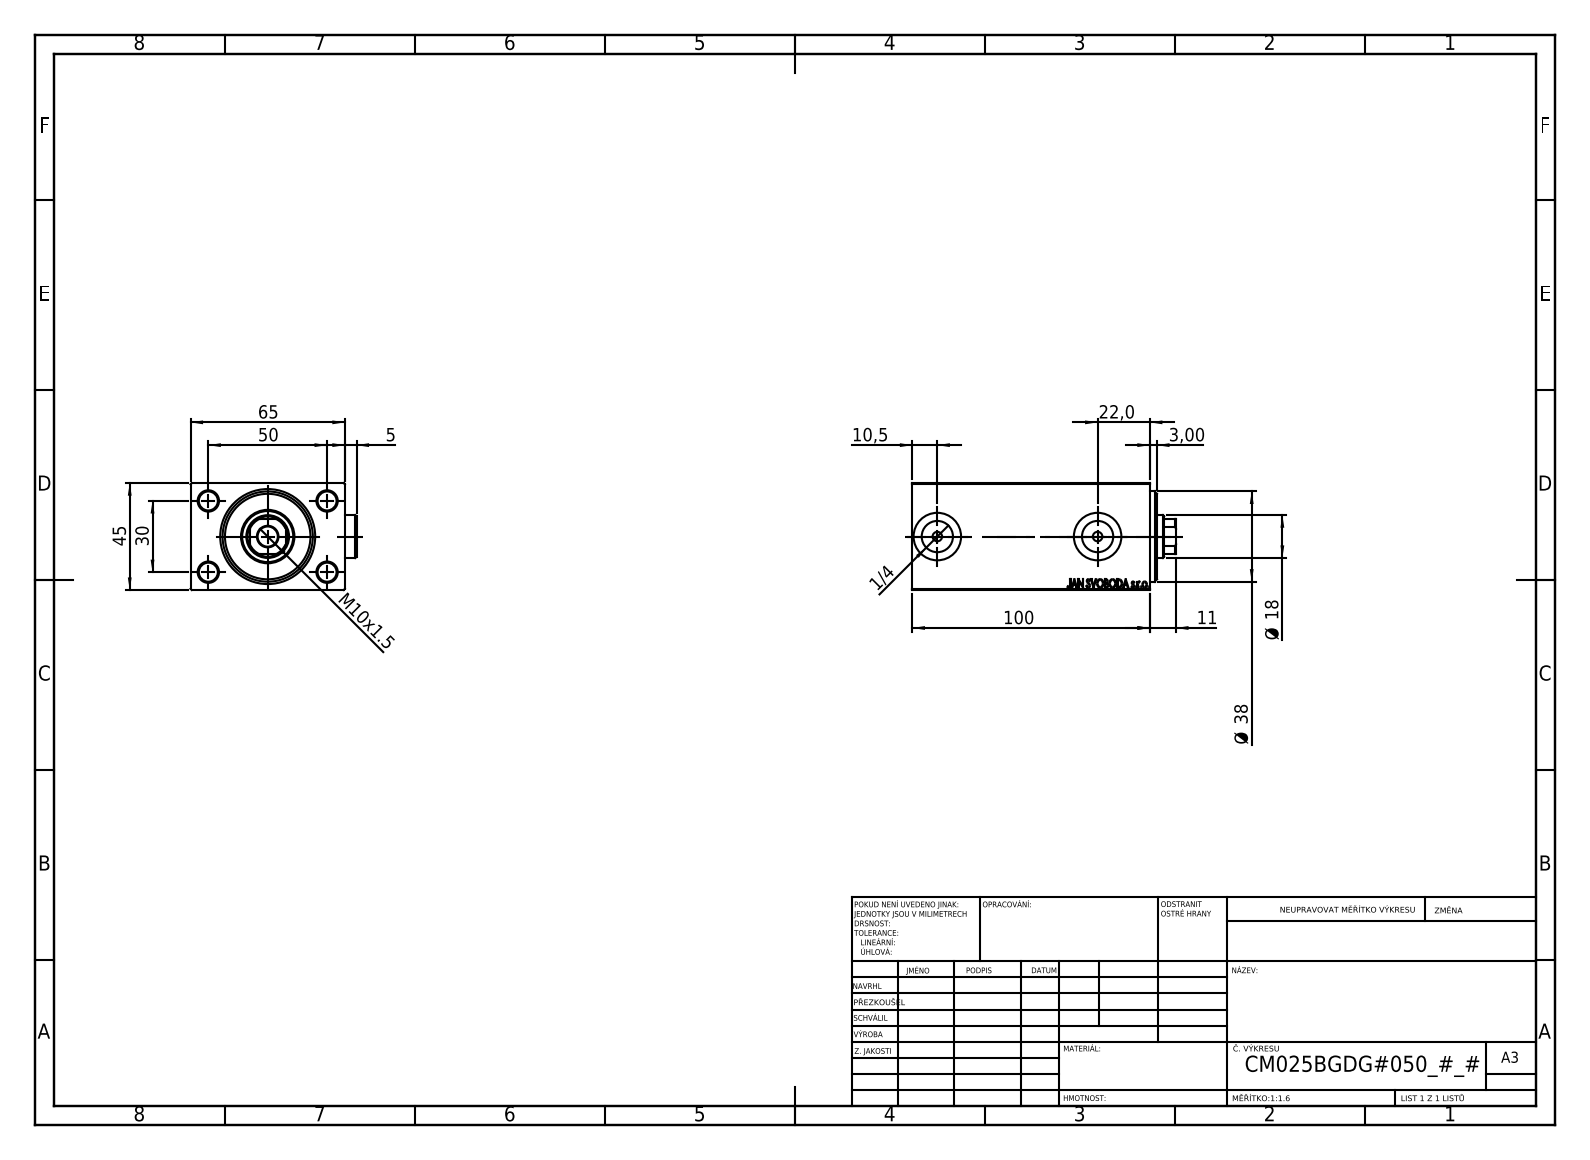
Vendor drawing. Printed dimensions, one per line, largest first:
100
65
50
45
Ø 38
30
22,0
Ø 18
11
10,5
M10x1.5
5
3,00
1/4
